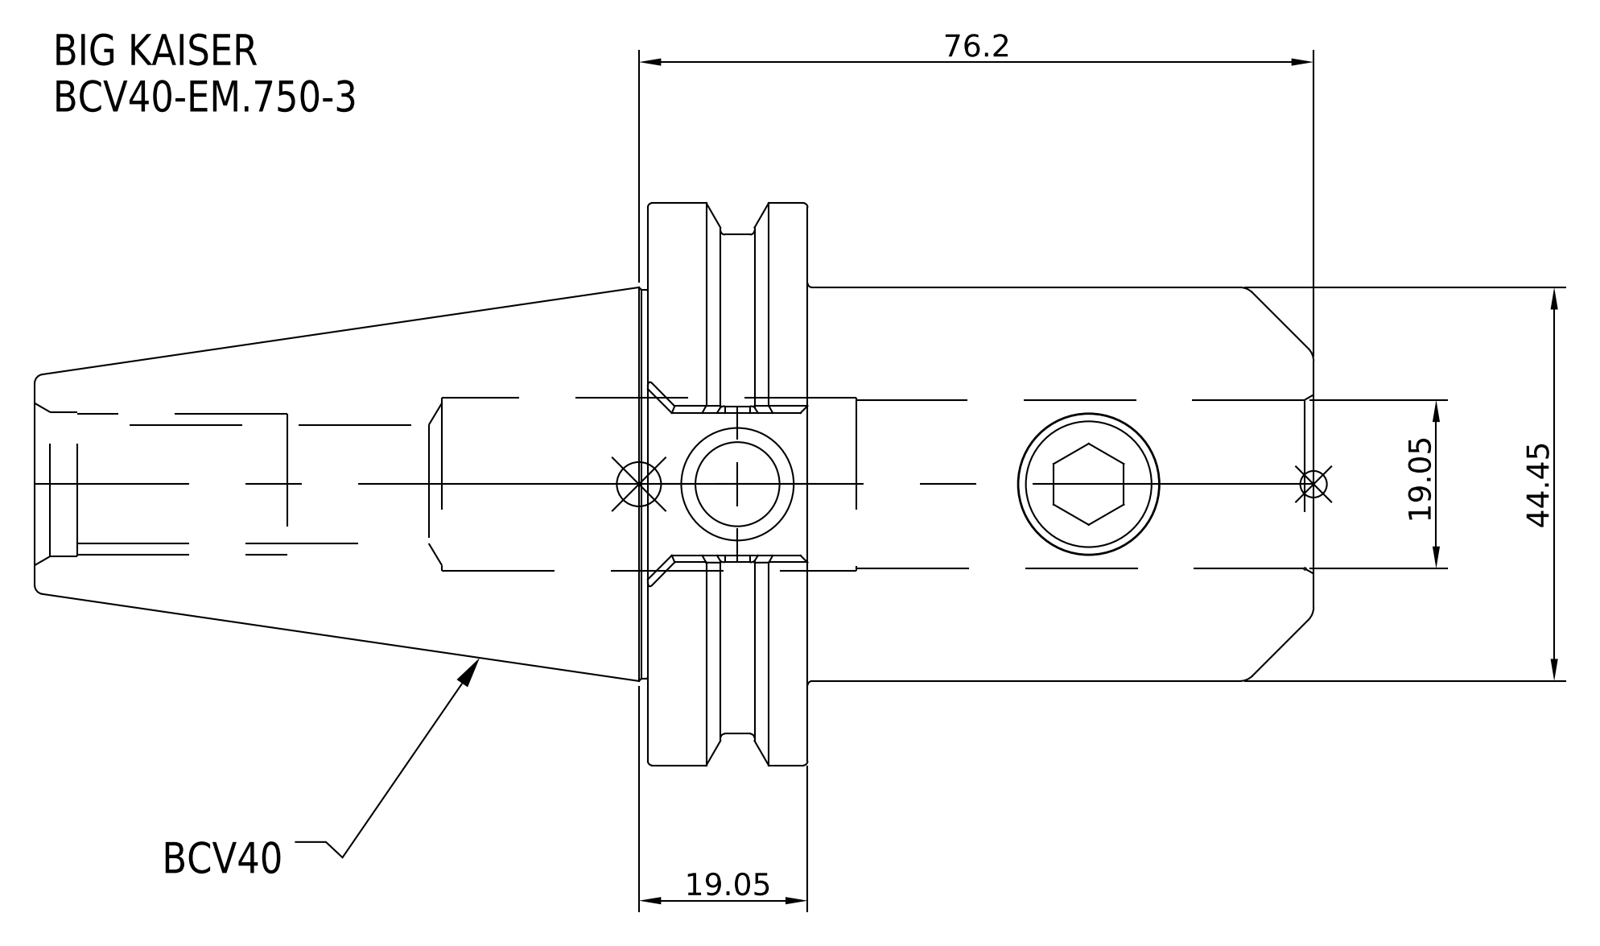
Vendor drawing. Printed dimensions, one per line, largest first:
76.2
44.45
19.05
19.05
